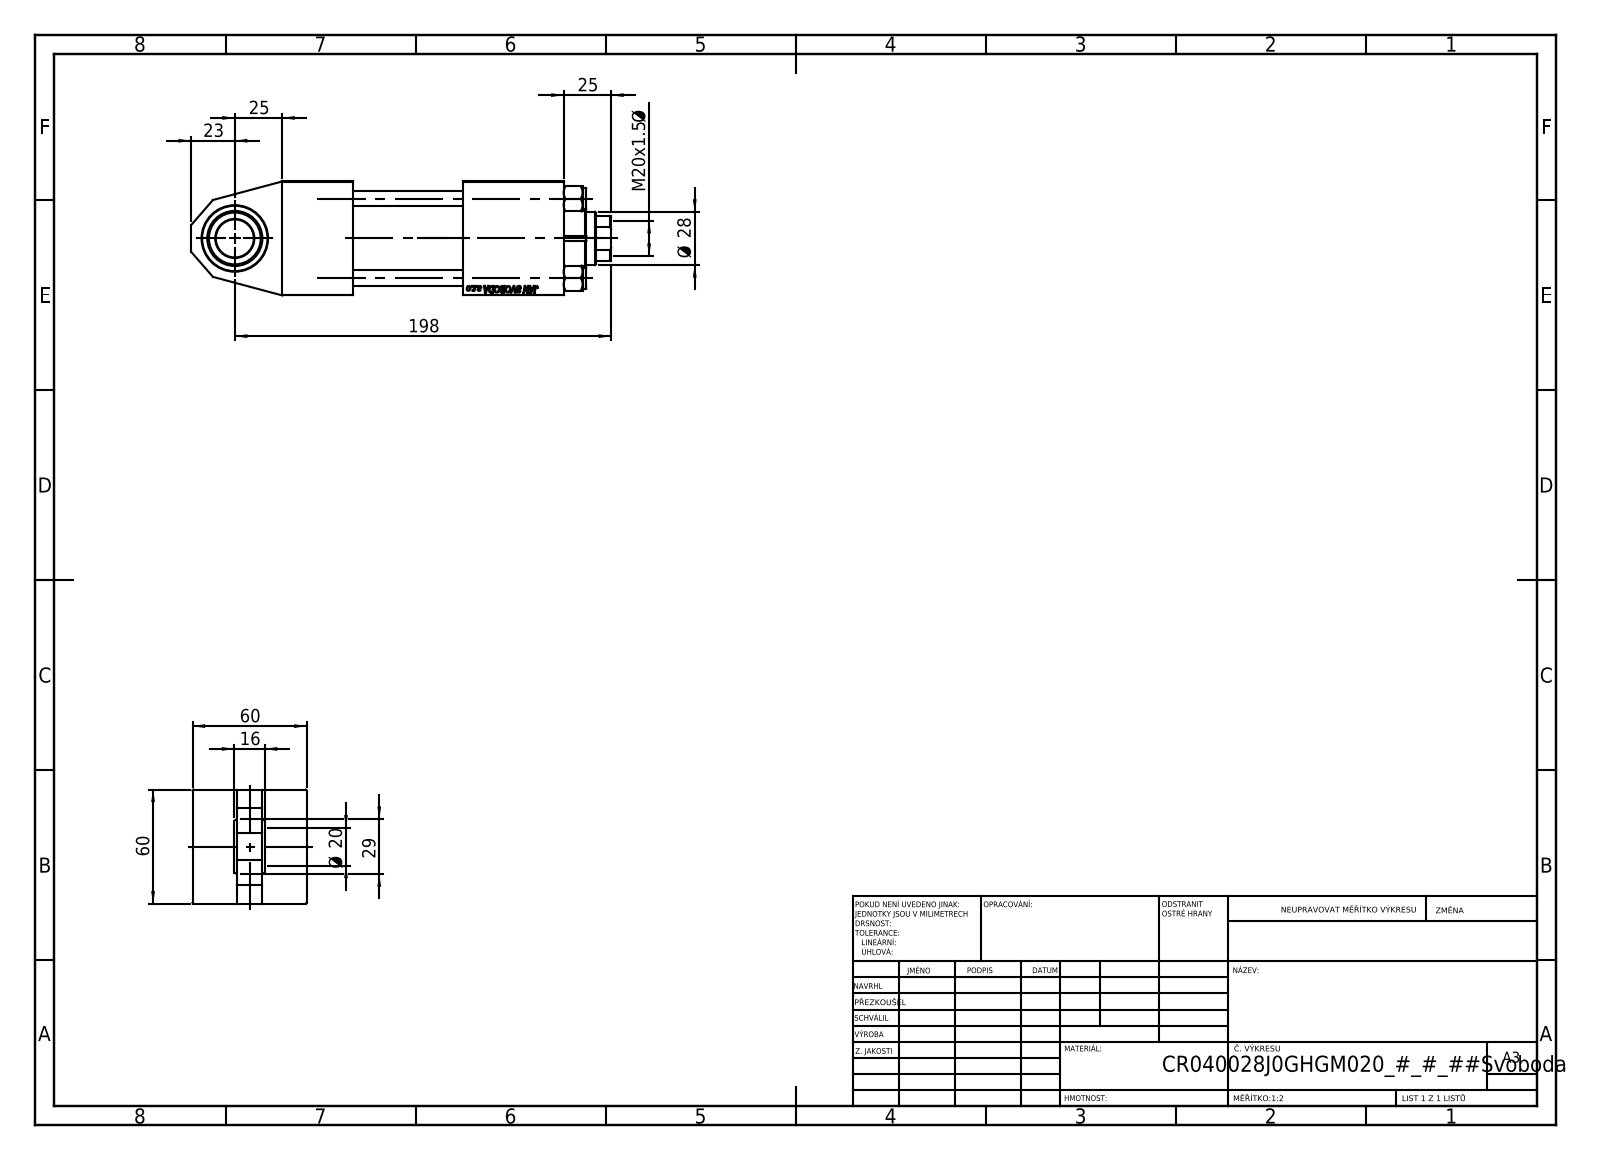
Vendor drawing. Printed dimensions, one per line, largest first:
198
60
60
29
Ø 28
25
25
23
M20x1.5 Ø
Ø 20
16
